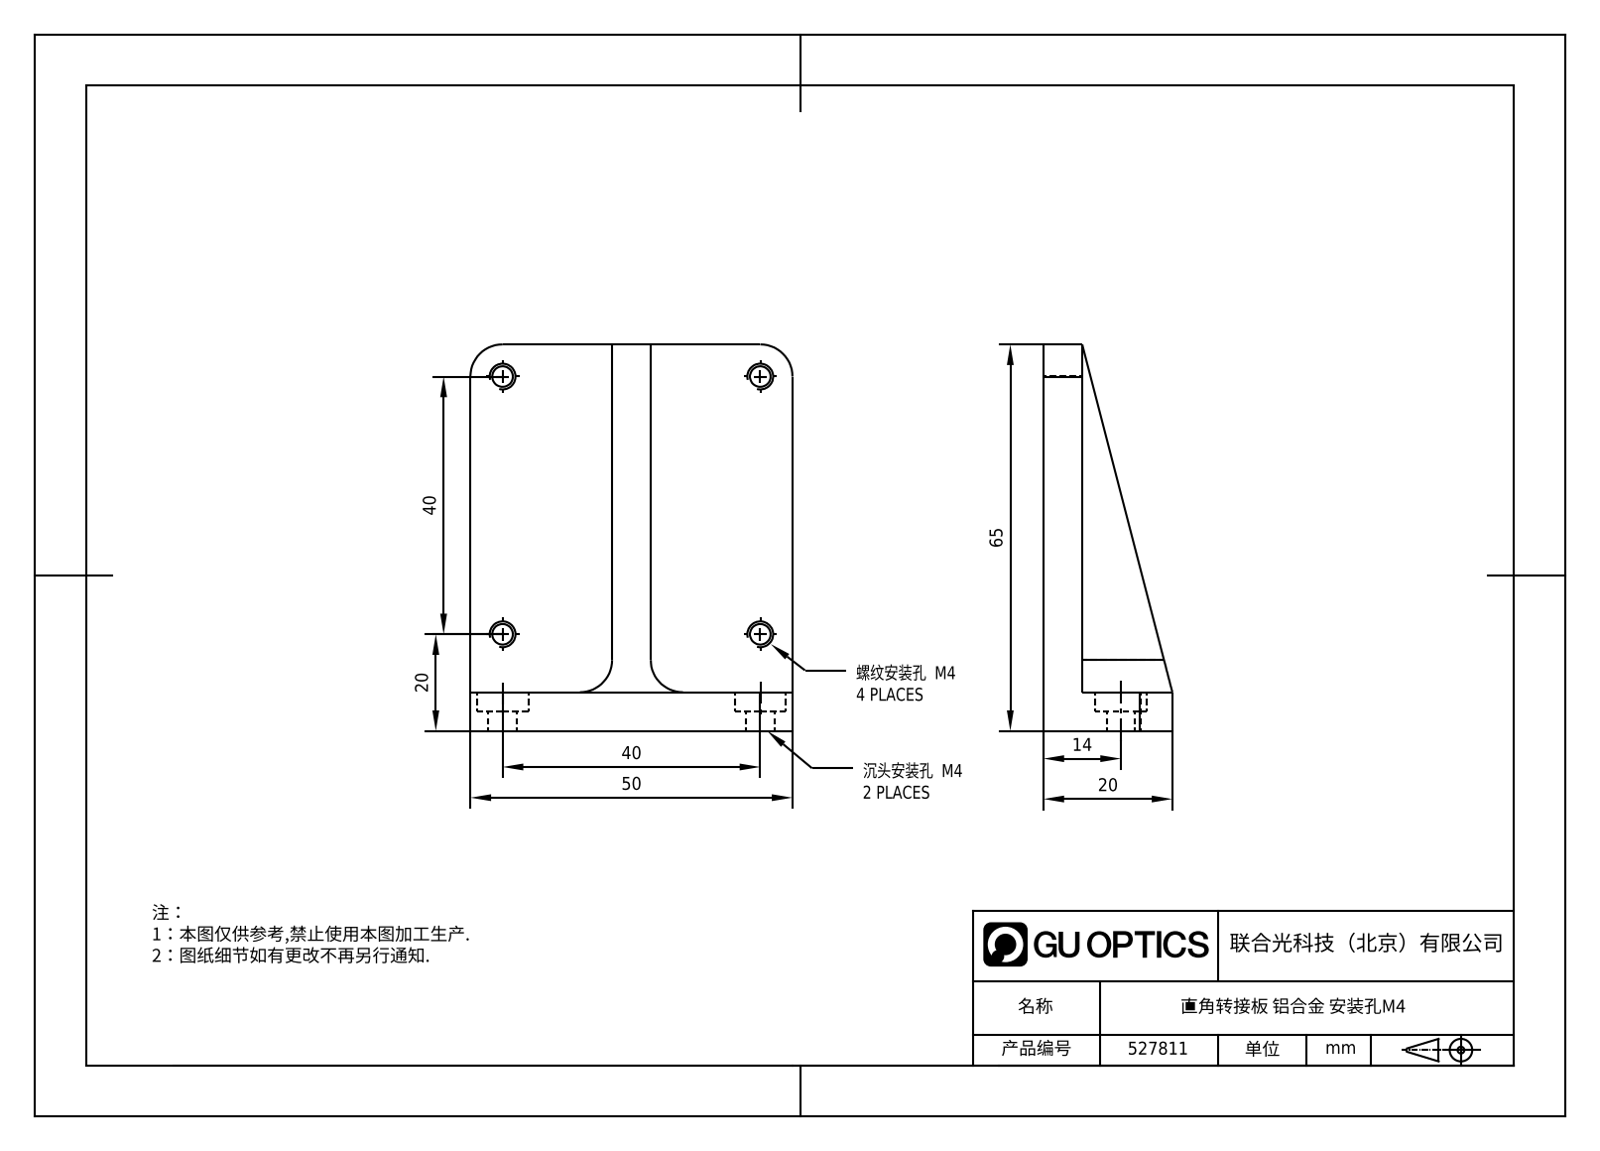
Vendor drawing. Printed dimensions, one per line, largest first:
65
50
40
40
20
20
14
